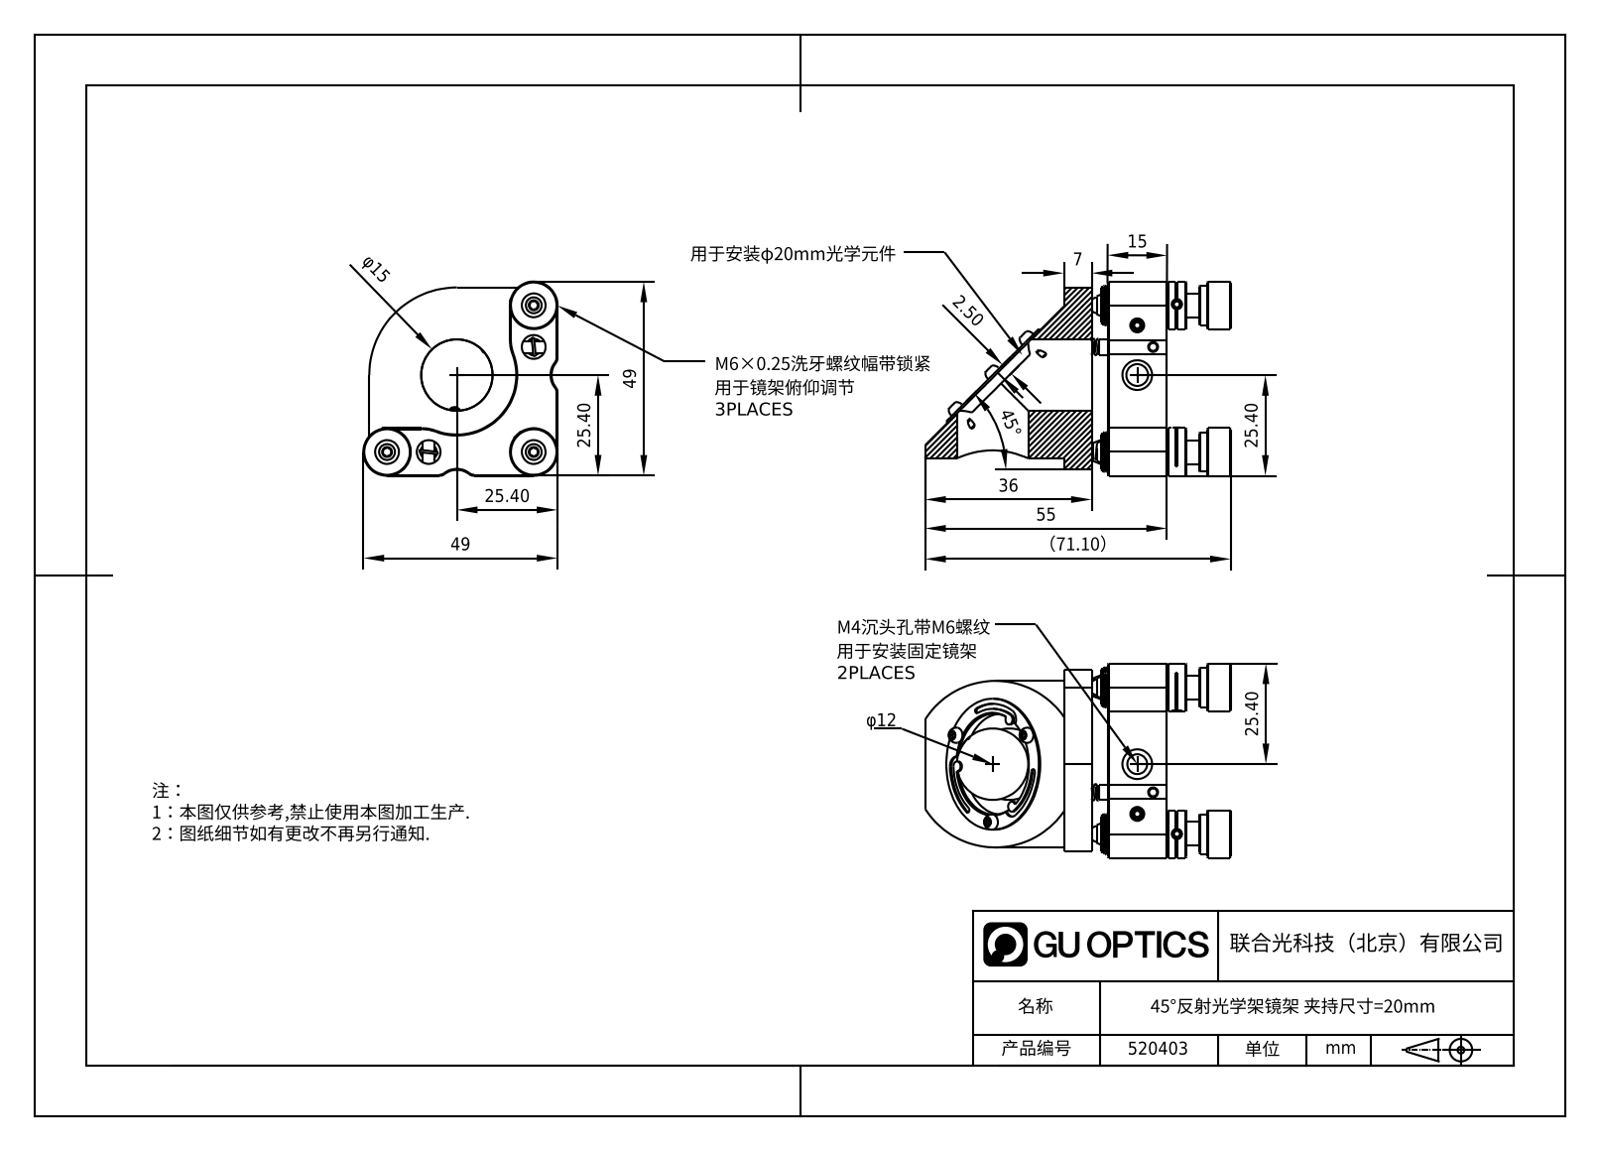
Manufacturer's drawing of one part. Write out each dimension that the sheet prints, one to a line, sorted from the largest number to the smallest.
（71.10）
55
49
49
45°
36
25.40
25.40
25.40
25.40
15
φ15
7
2.50
